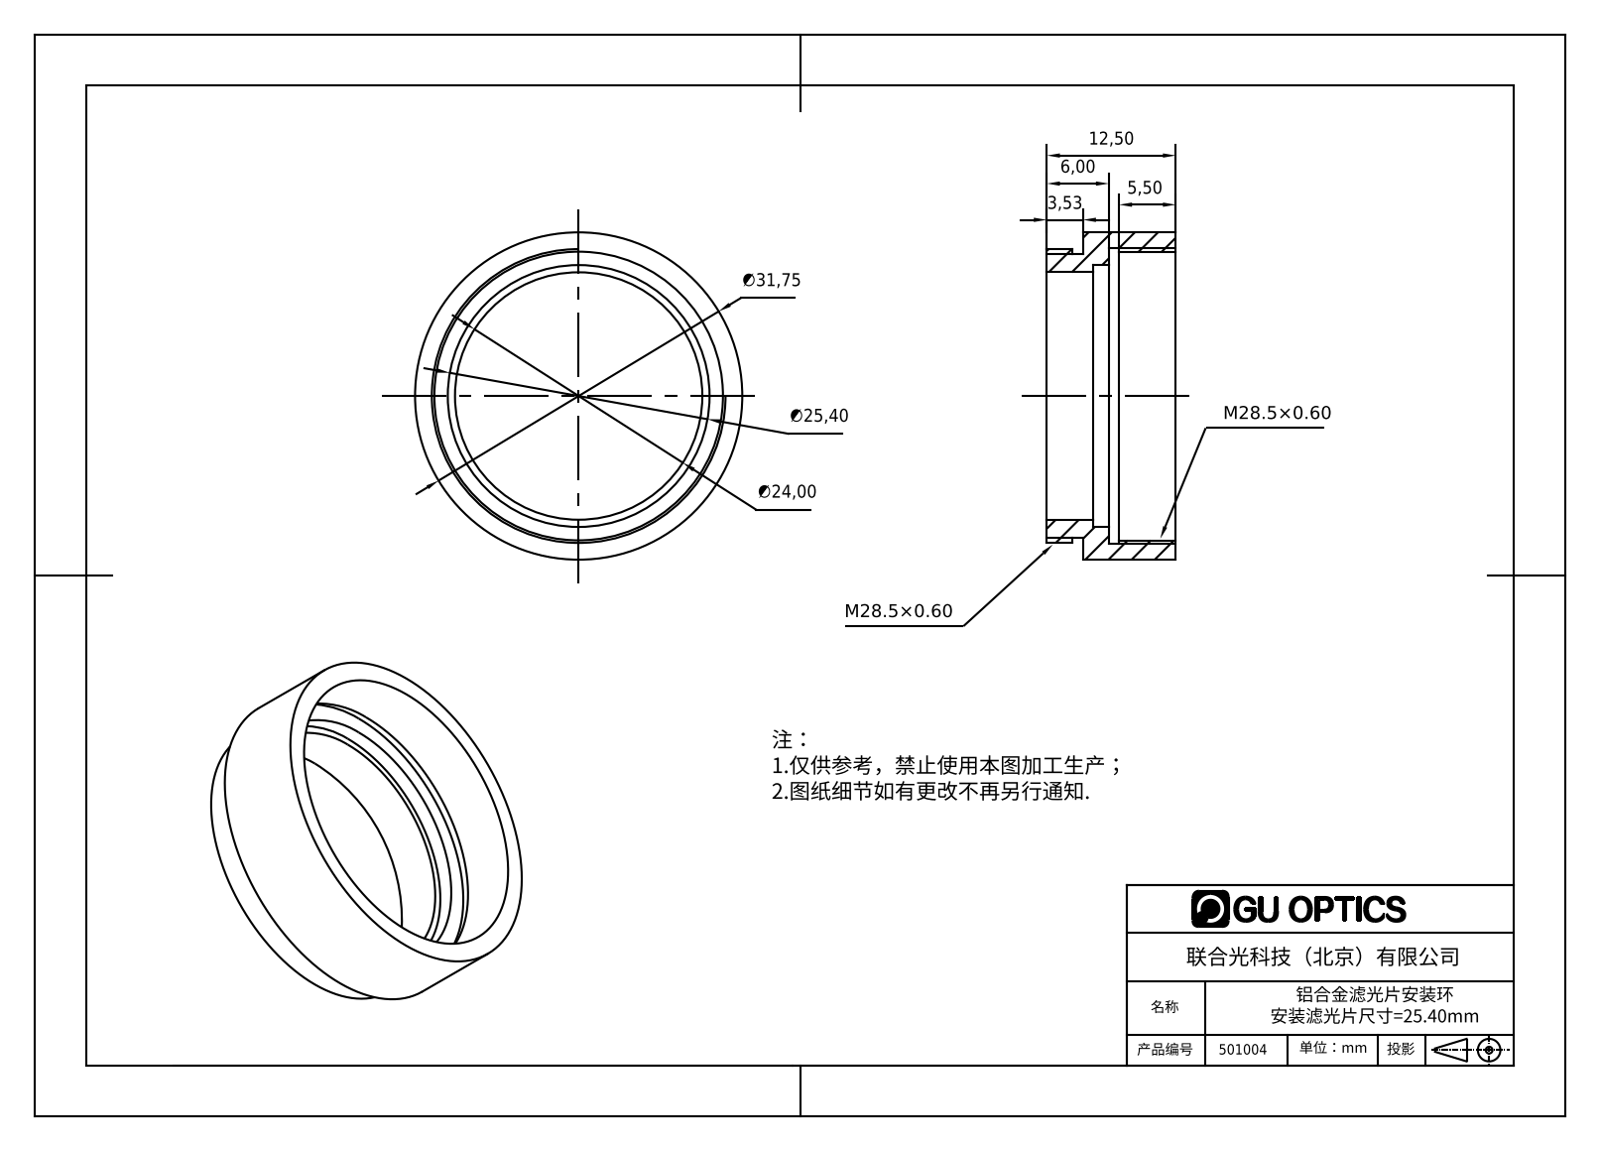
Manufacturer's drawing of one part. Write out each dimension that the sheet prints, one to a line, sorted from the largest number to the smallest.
∅31,75
∅25,40
∅24,00
12,50
6,00
5,50
3,53
